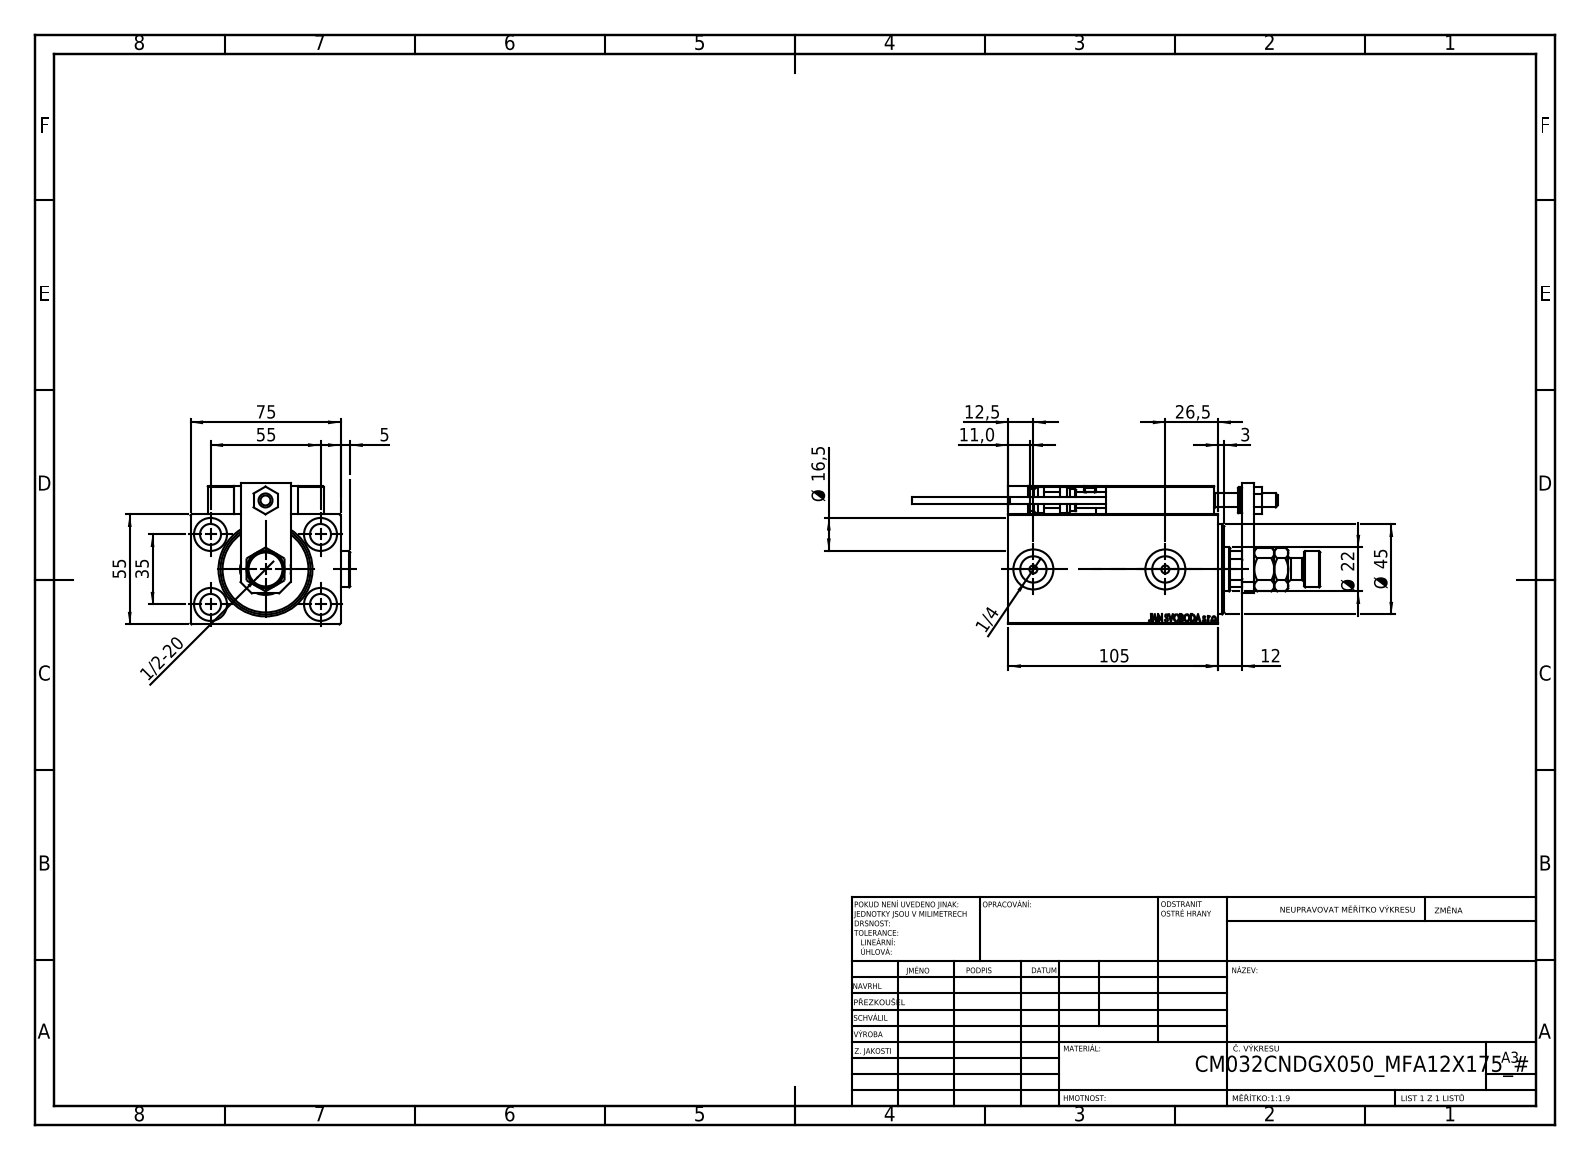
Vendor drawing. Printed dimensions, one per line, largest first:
105
75
55
55
Ø 45
35
26,5
Ø 22
Ø 16,5
12,5
12
11,0
5
3
1/2-20
1/4
